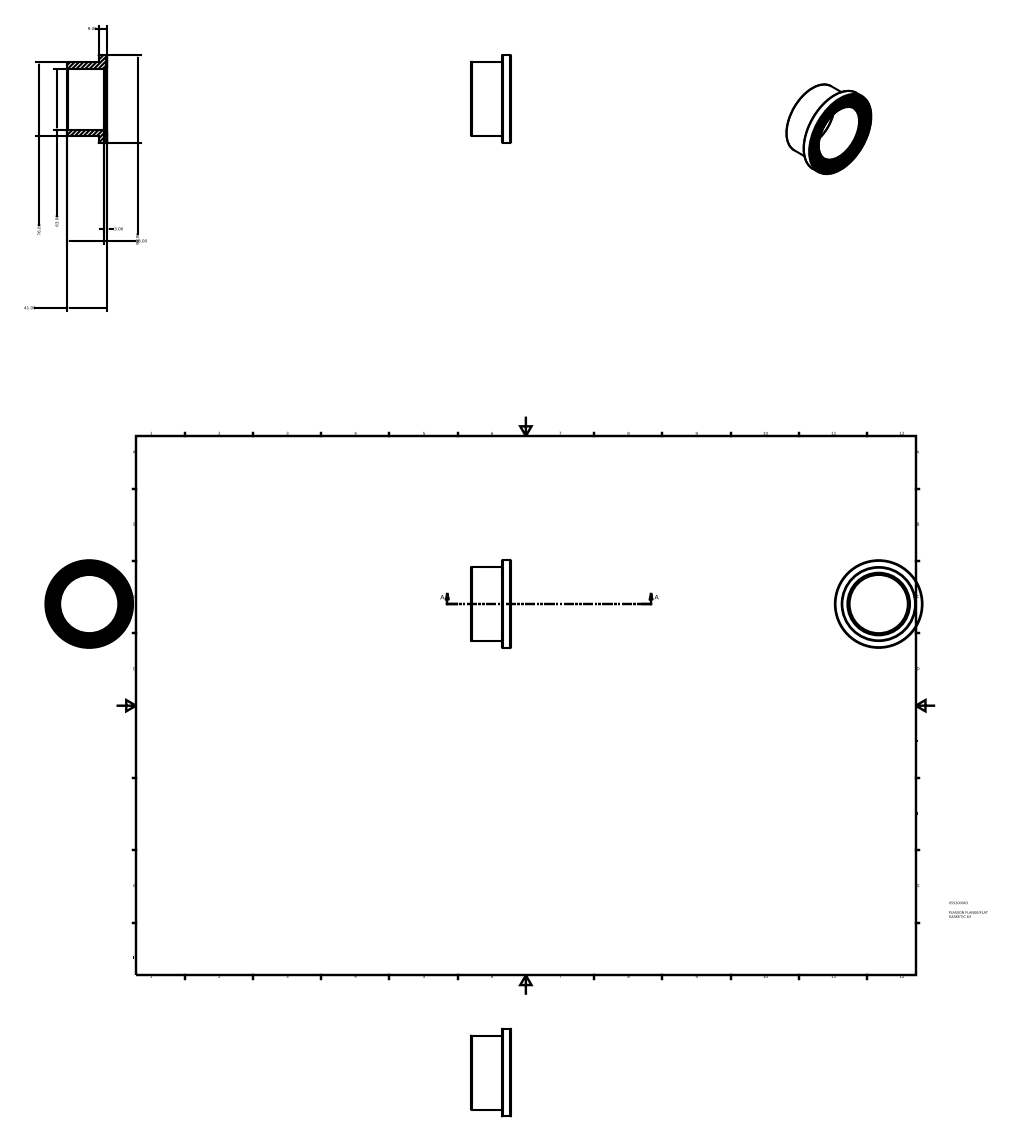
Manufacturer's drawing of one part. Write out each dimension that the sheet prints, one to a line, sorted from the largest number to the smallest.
90.00
76.00
63.00
41.00
38.00
9.00
3.00
